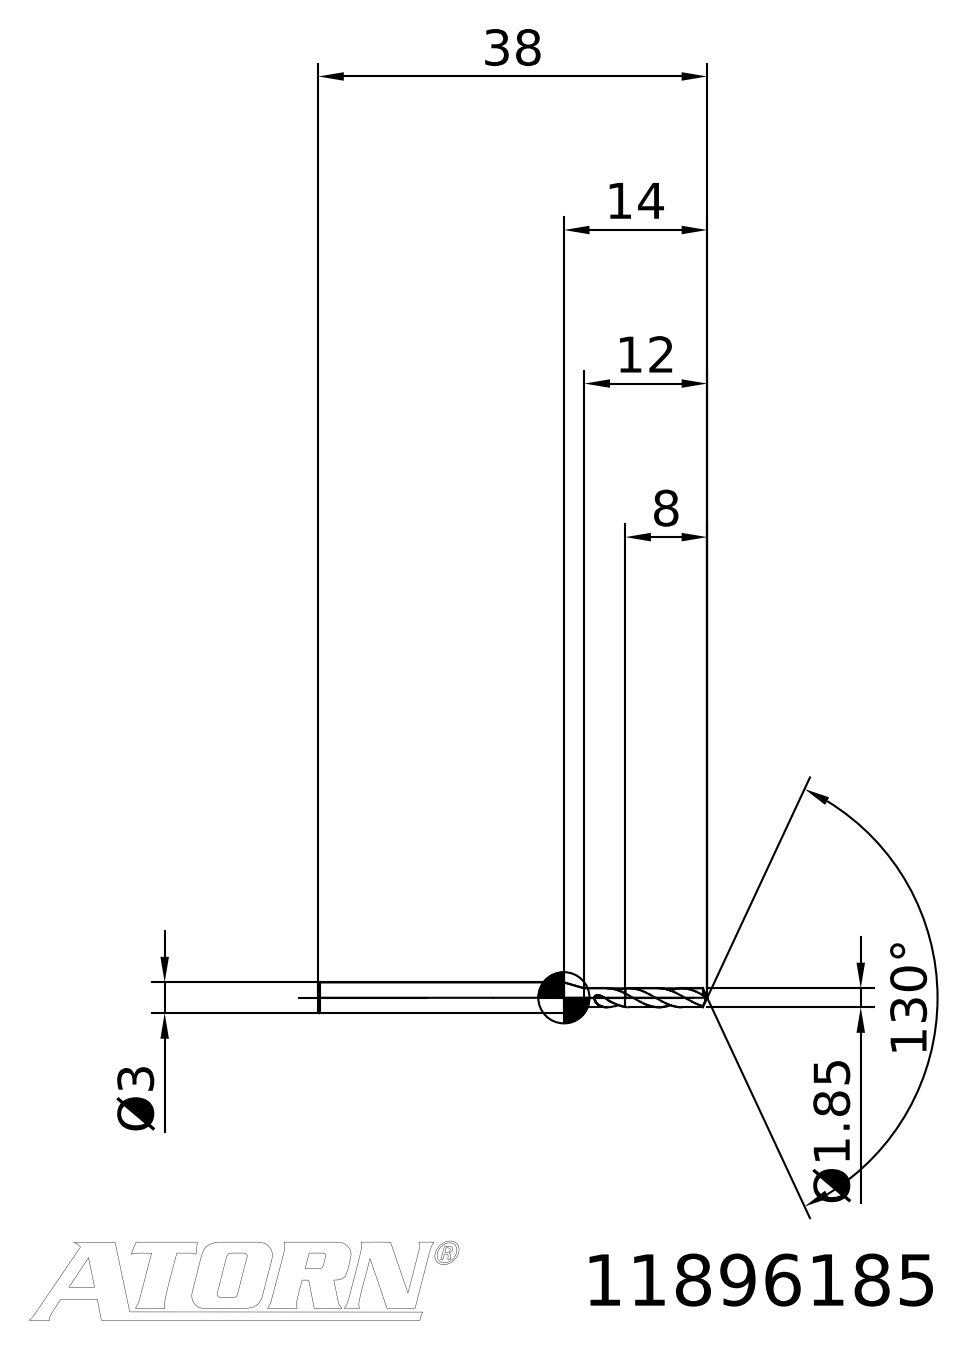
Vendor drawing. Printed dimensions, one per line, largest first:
130°
38
14
12
8
Ø3
Ø1.85
